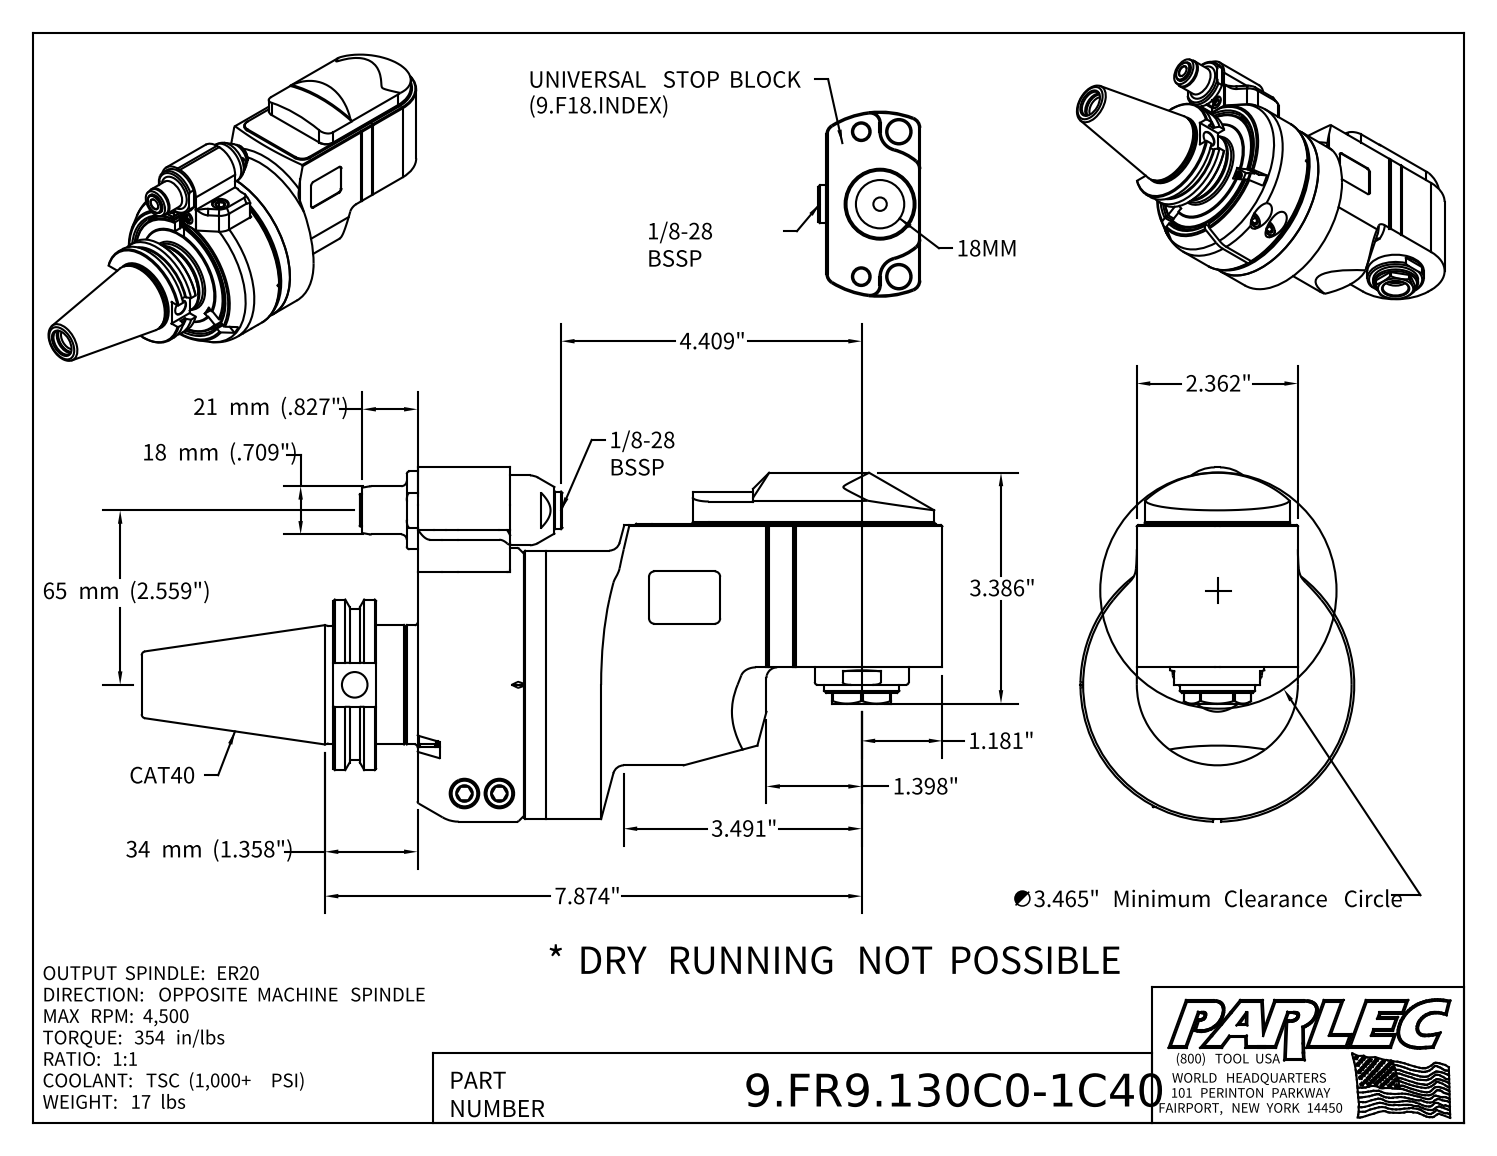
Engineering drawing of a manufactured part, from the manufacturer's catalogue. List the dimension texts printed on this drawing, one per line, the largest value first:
65 mm (2.559")
34 mm (1.358")
21 mm (.827")
18 mm (.709")
7.874"
4.409"
3.491"
∅3.465" Minimum Clearance Circle
3.386"
2.362"
1.398"
1.181"
